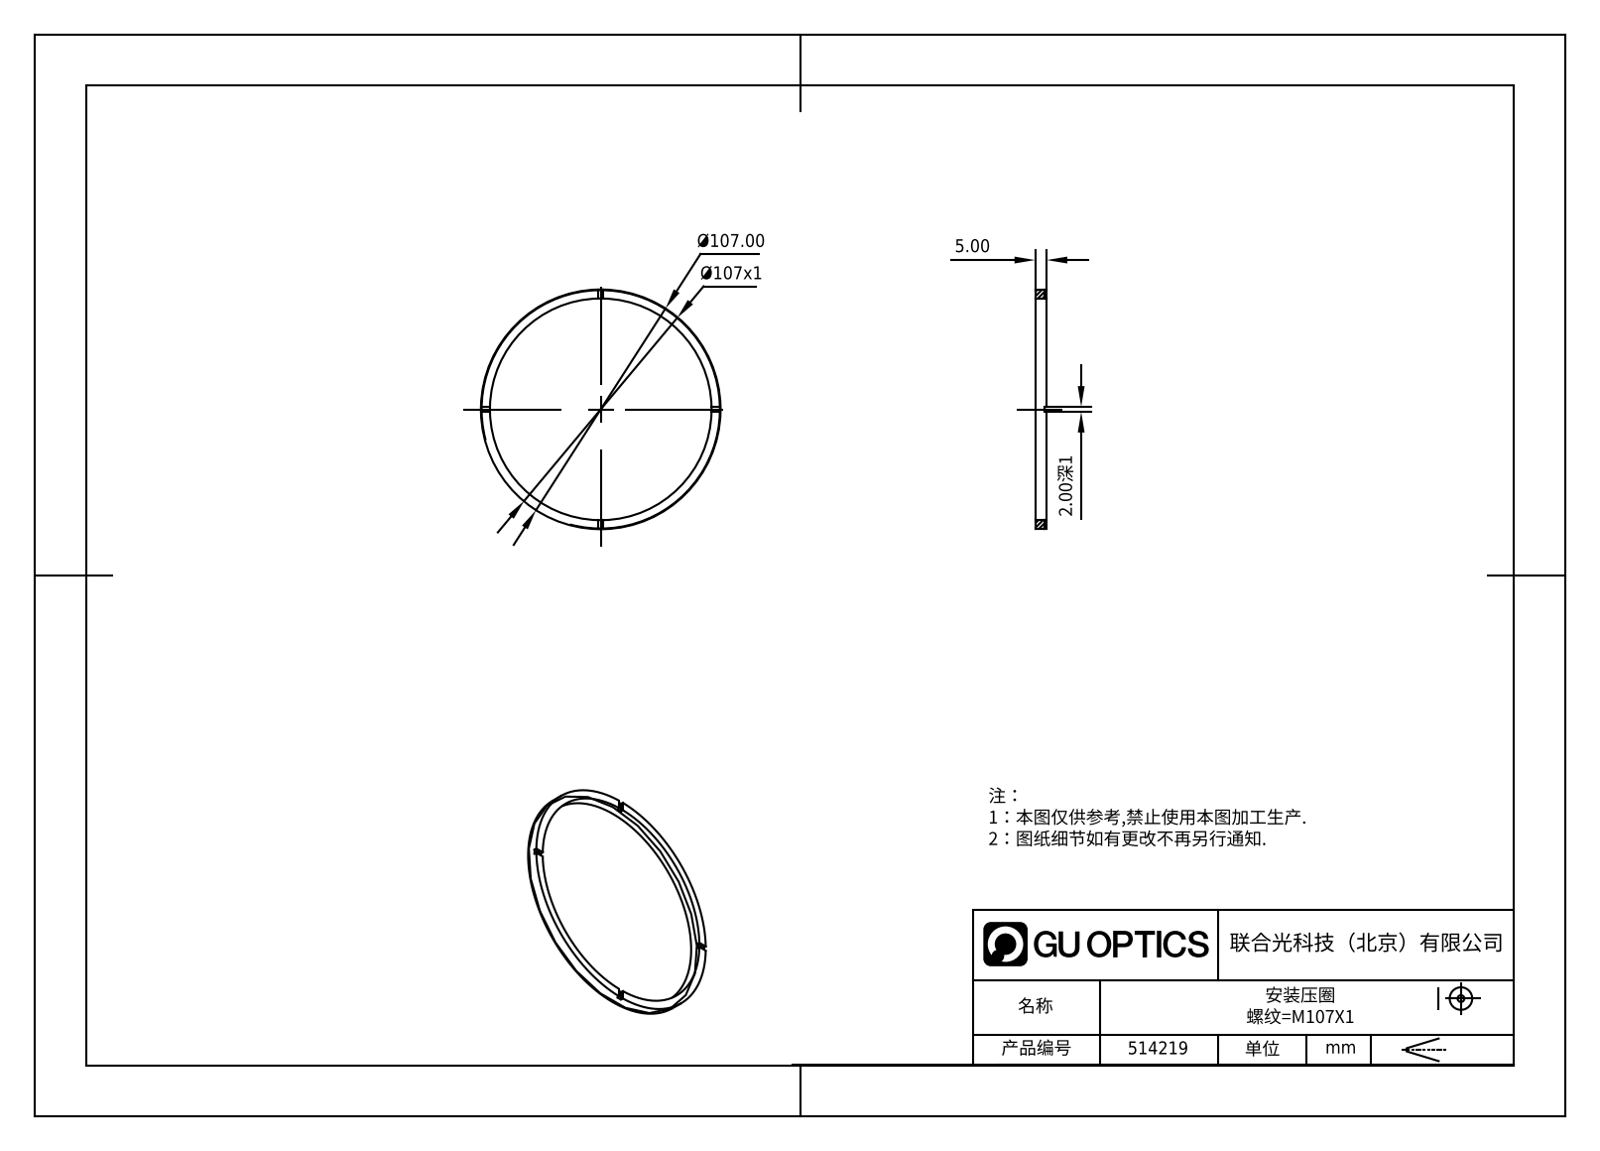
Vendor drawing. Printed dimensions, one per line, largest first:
Ø107.00
Ø107x1
5.00
2.00深1
